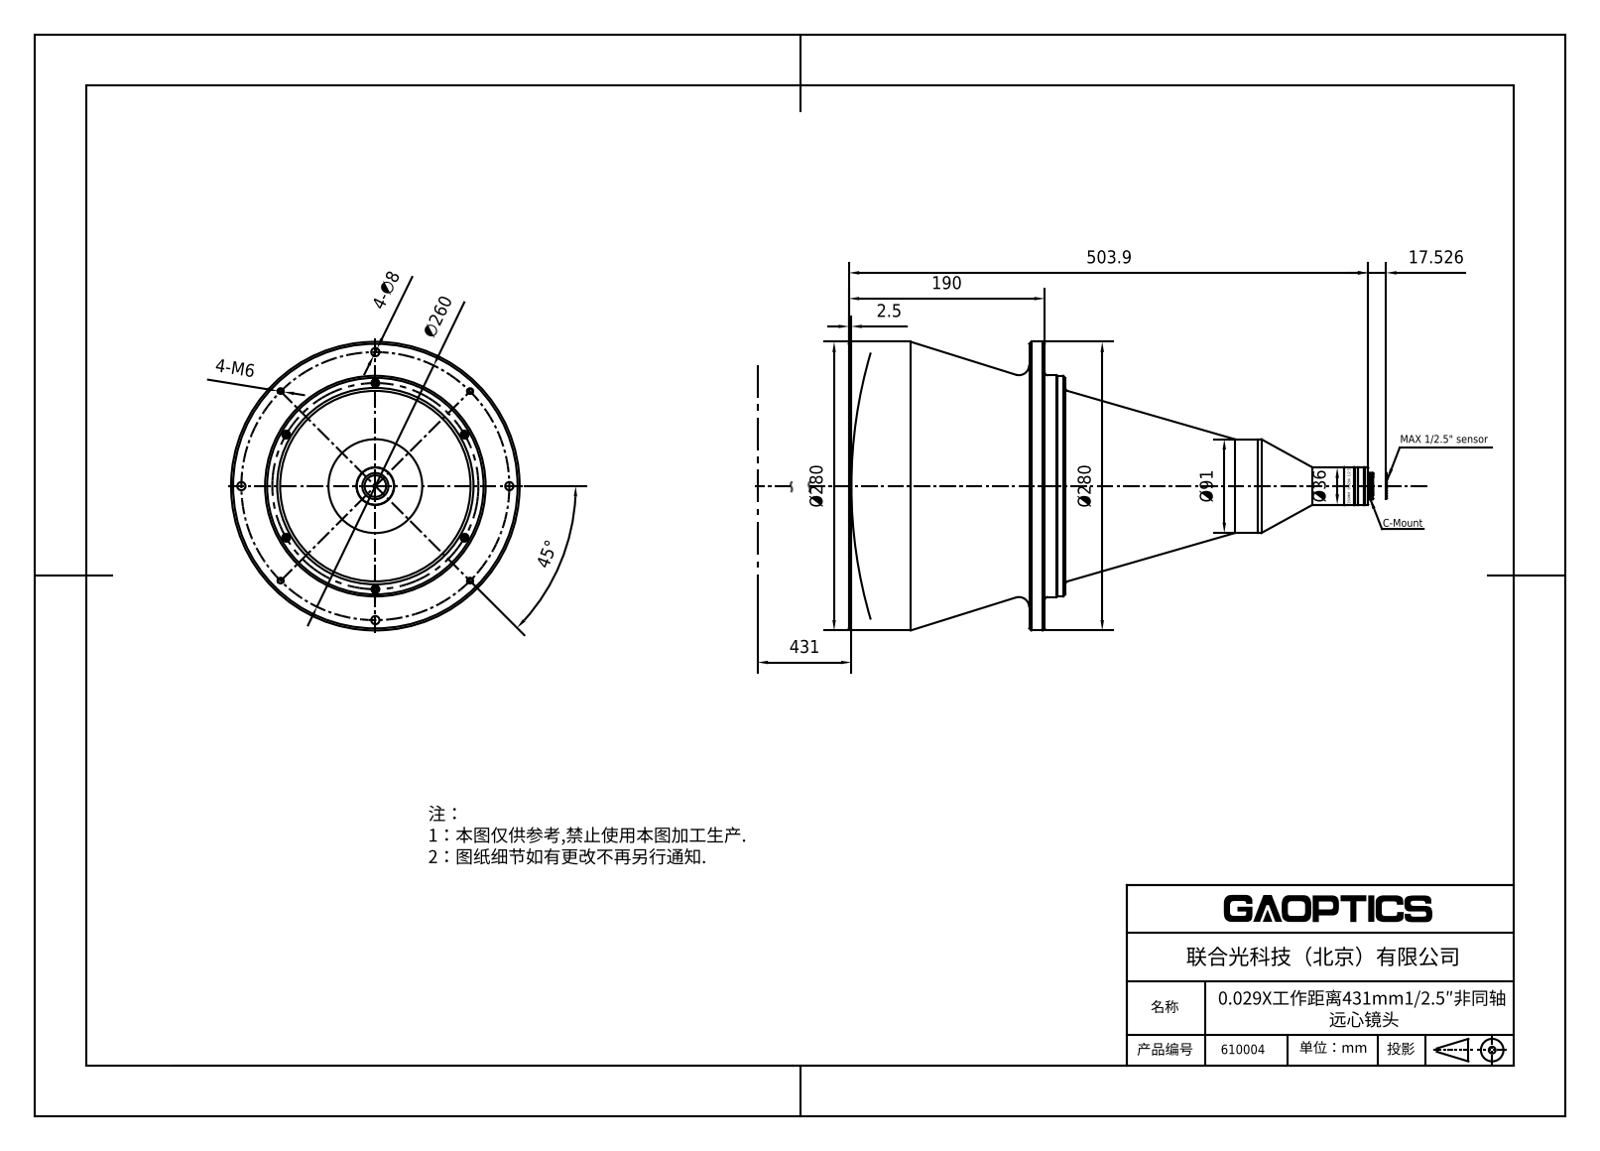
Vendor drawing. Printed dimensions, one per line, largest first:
503.9
431
Ø280
Ø280
∅260
190
Ø91
45°
Ø36
17.526
4-∅8
4-M6
2.5
